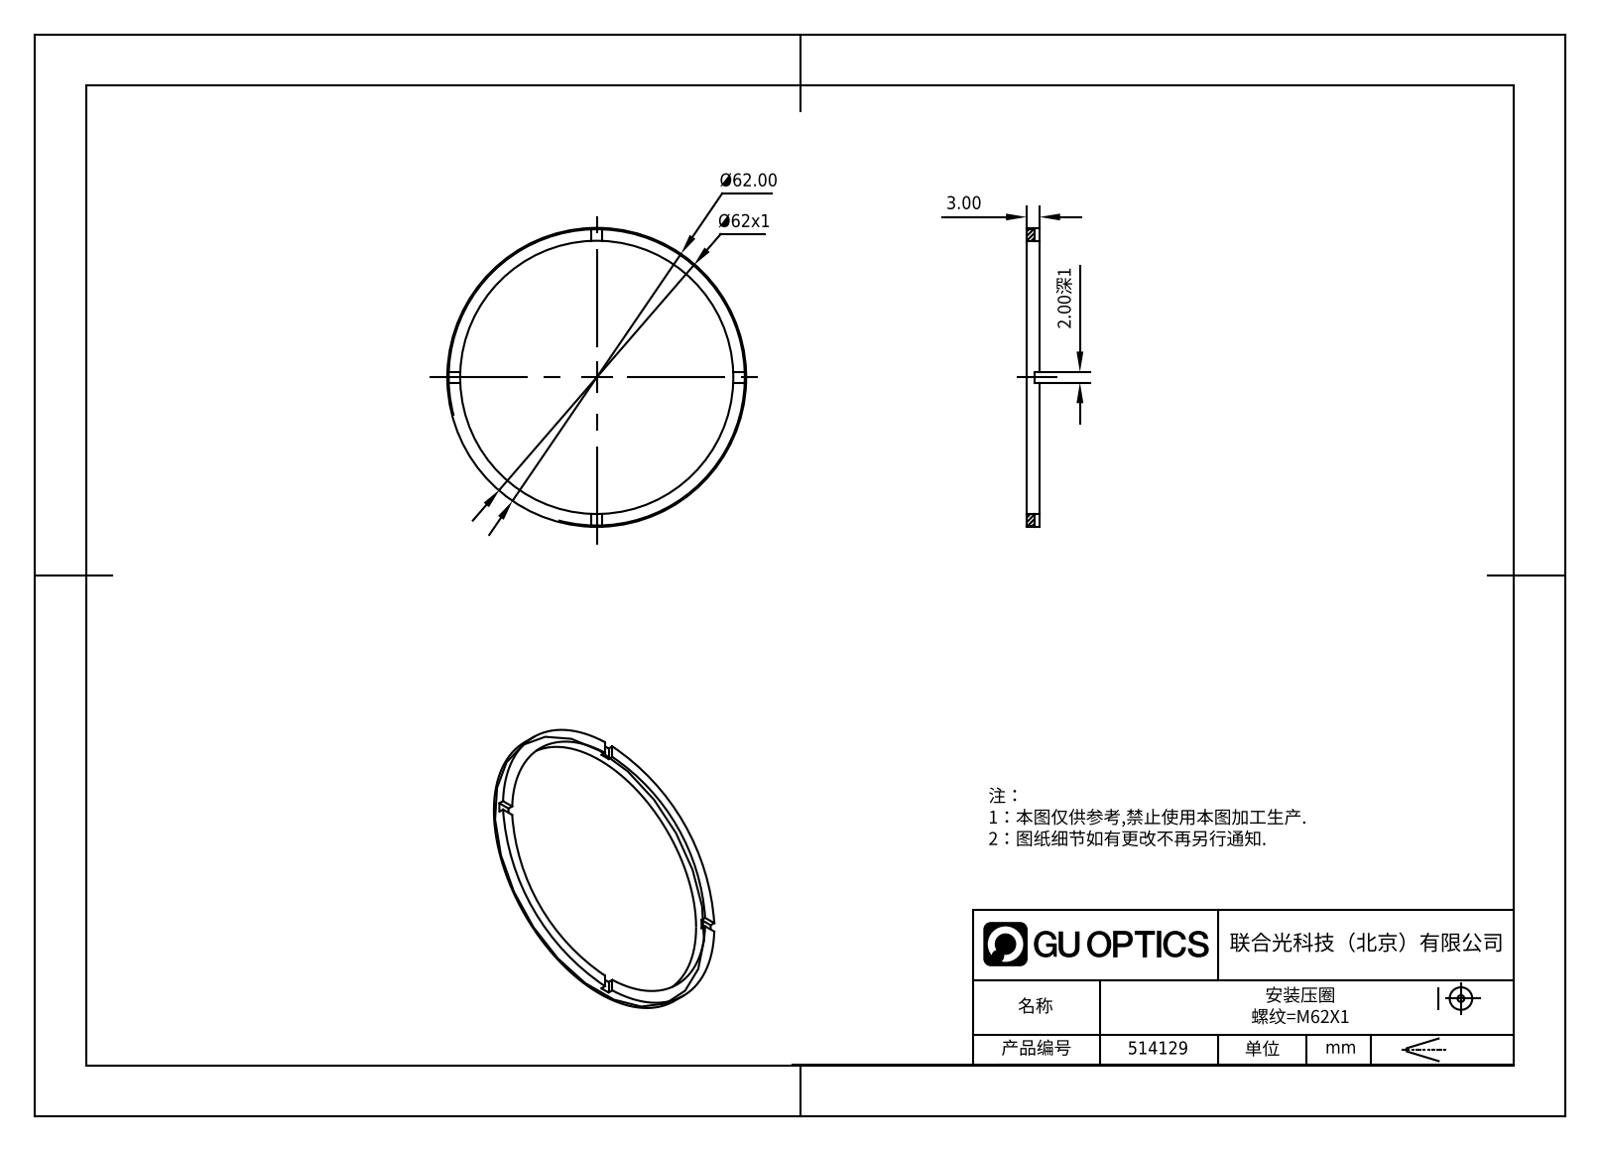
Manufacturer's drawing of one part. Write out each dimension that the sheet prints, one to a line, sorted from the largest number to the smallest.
Ø62.00
Ø62x1
3.00
2.00深1
